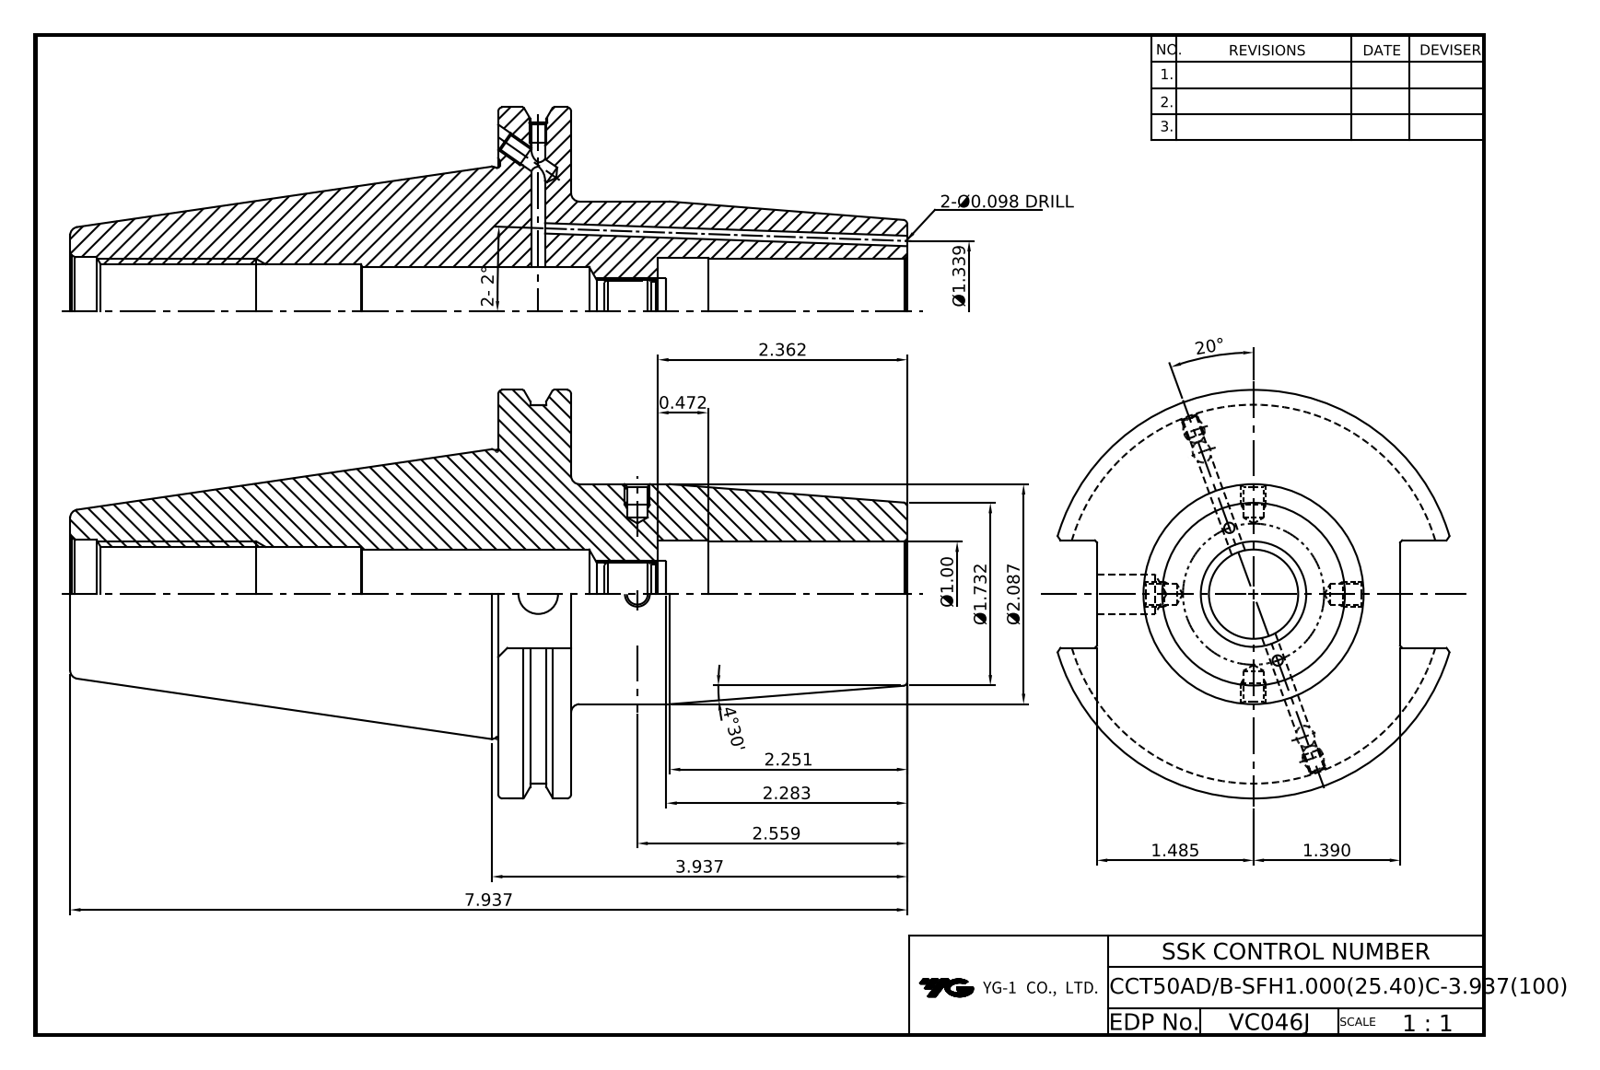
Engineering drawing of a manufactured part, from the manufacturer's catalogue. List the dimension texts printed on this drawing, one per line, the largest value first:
20°
7.937
4°30'
3.937
2.559
2.362
2.283
2.251
Ø2.087
2- 2°
Ø1.732
1.485
1.390
0.472
